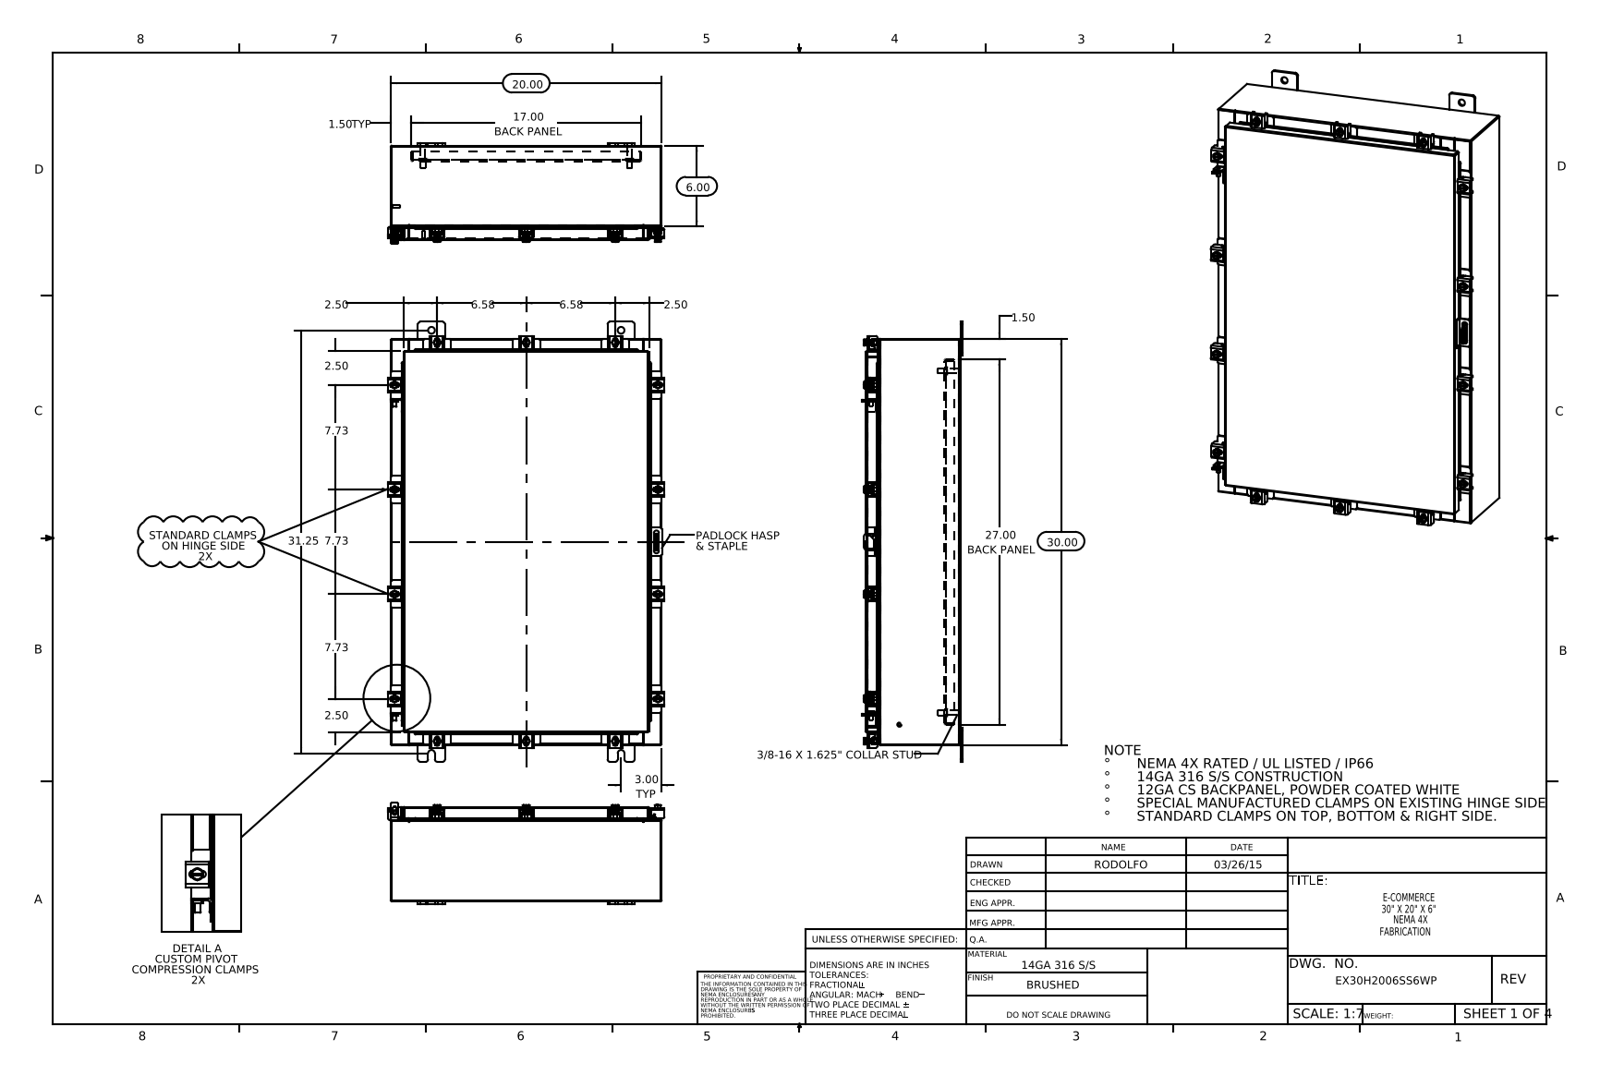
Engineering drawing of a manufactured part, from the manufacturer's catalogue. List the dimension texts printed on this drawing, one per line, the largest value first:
31.25
30.00
27.00 BACK PANEL
20.00
17.00 BACK PANEL
7.73
7.73
7.73
6.58
6.58
6.00
3.00 TYP
2.50
2.50
2.50
2.50
1.50 TYP
1.50
